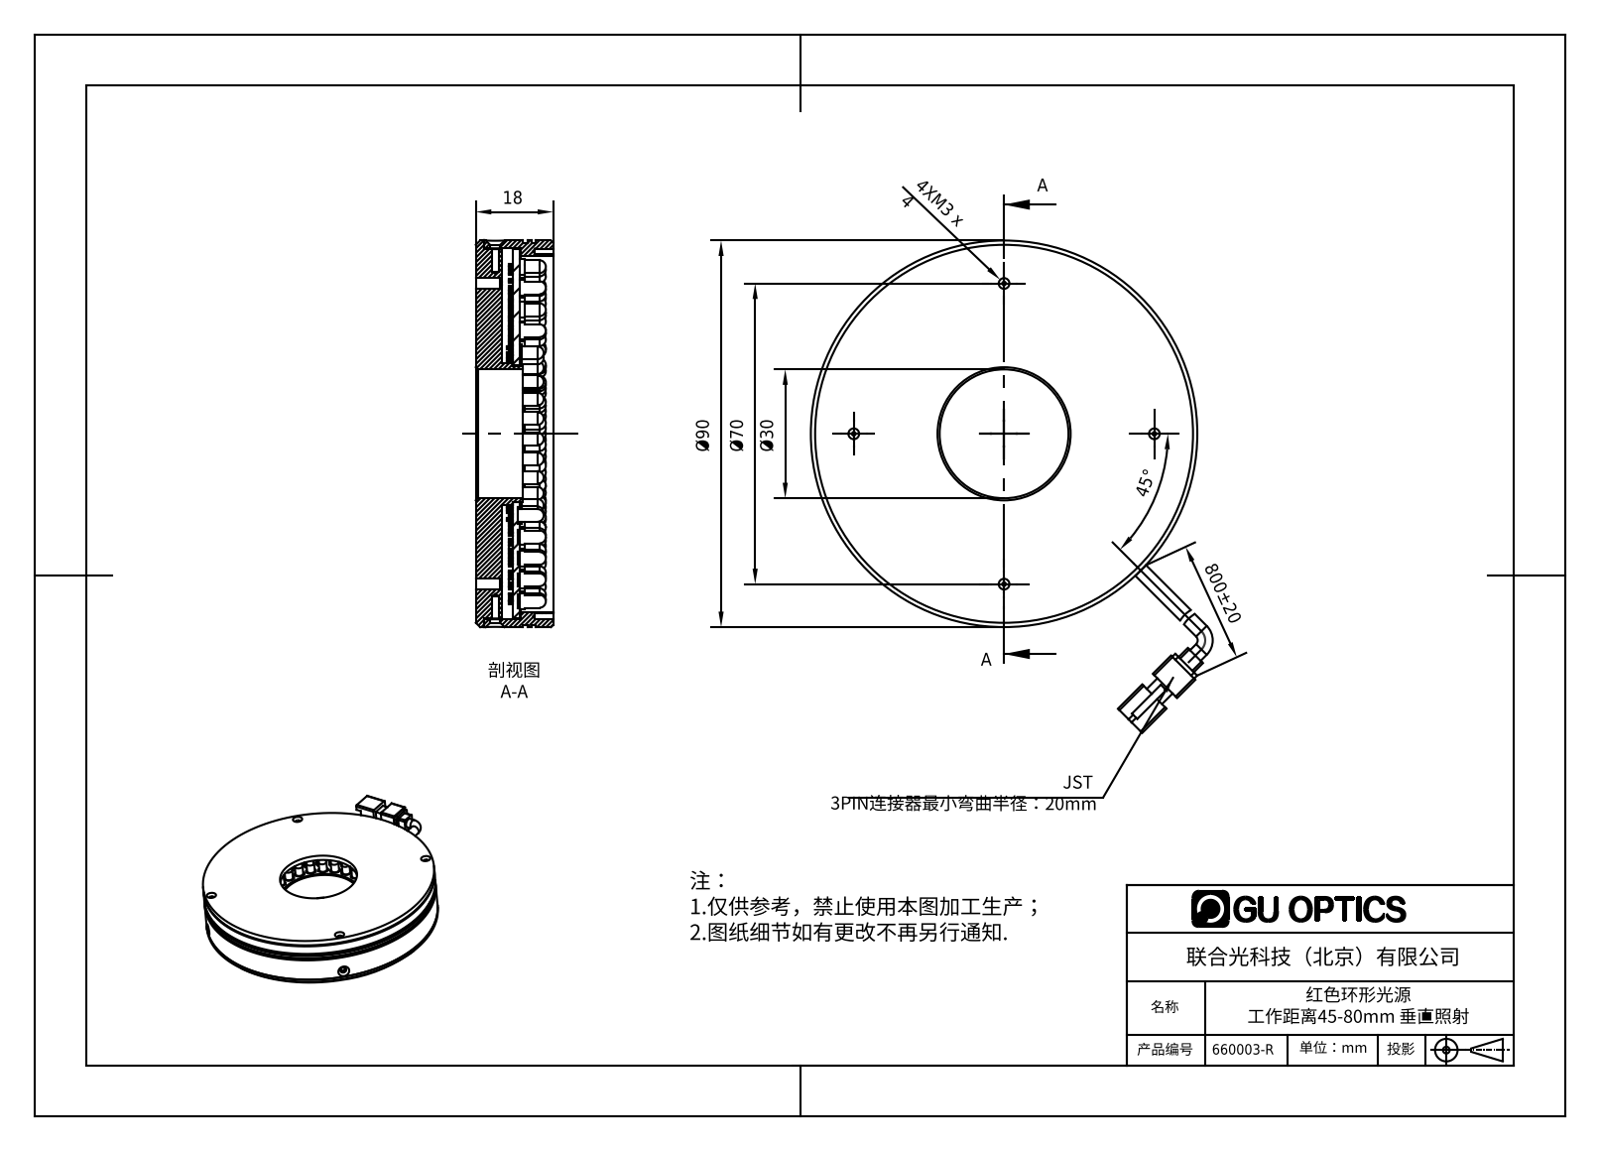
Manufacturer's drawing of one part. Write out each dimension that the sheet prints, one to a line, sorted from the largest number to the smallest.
800±20
Ø90
Ø70
45°
Ø30
18
4XM3 x 4
